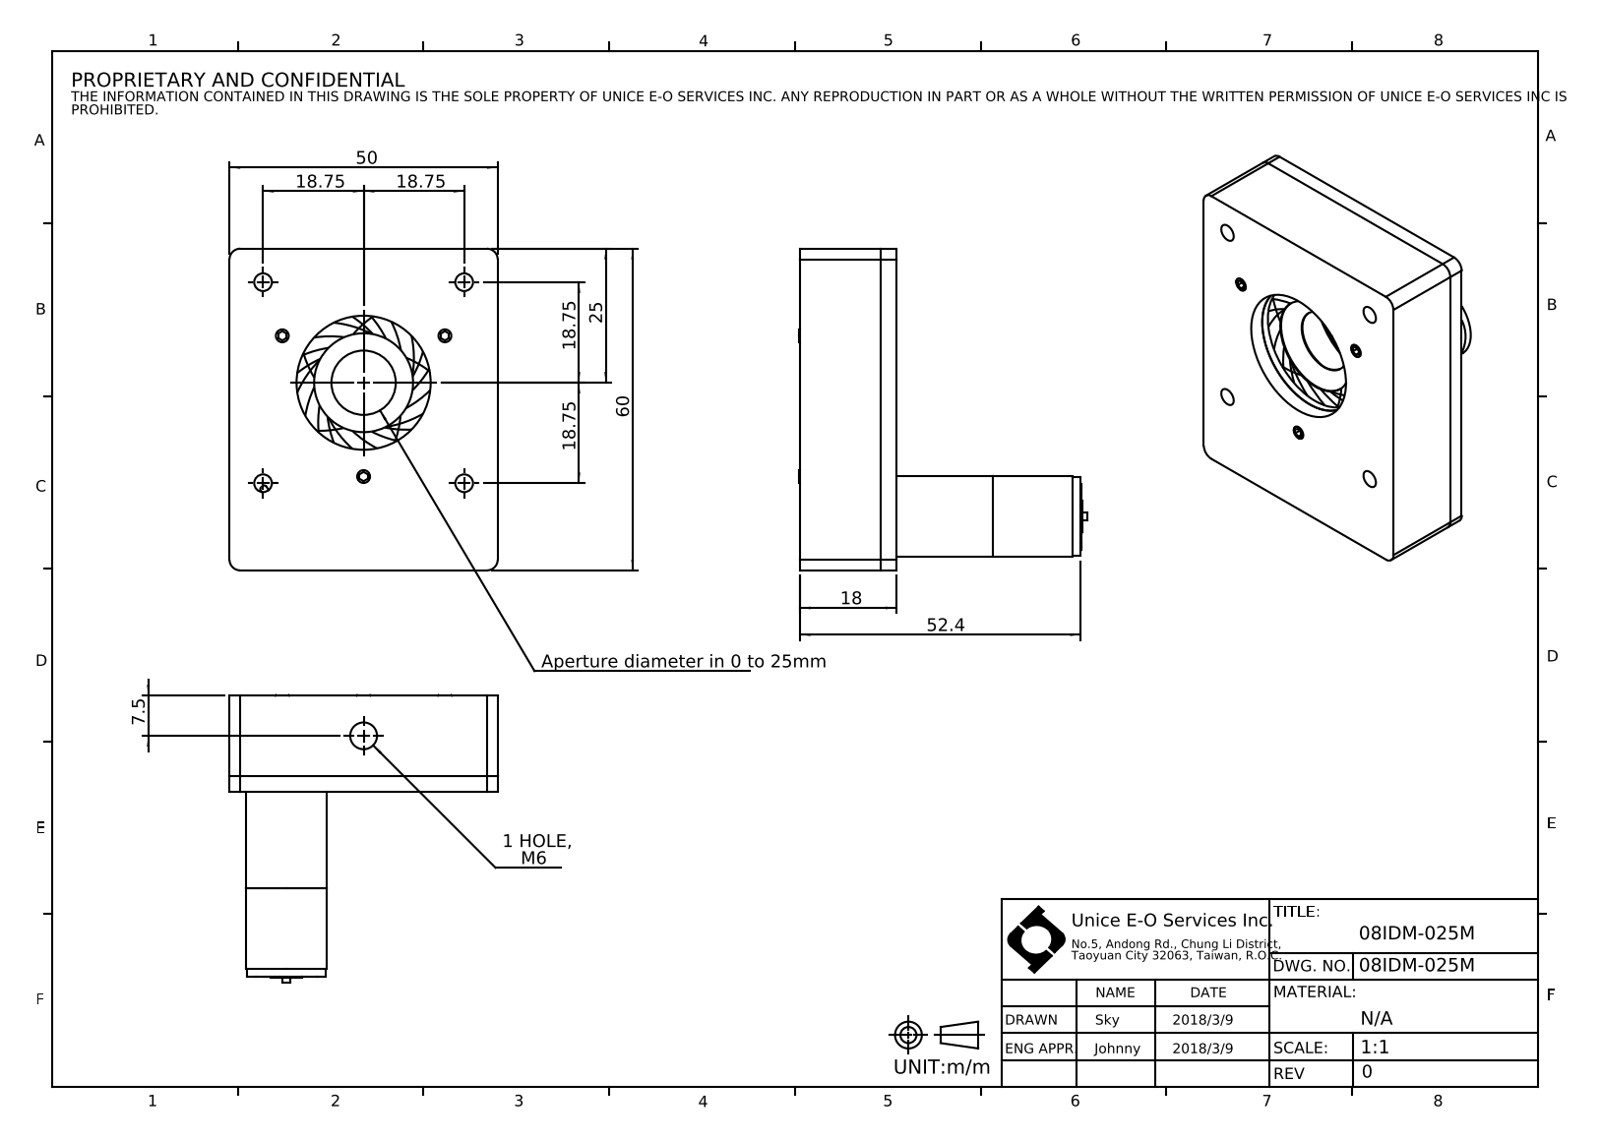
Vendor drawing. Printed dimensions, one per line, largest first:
60
52.4
50
25
18.75
18.75
18.75
18.75
18
7.5
1 HOLE, M6
Aperture diameter in 0 to 25mm
